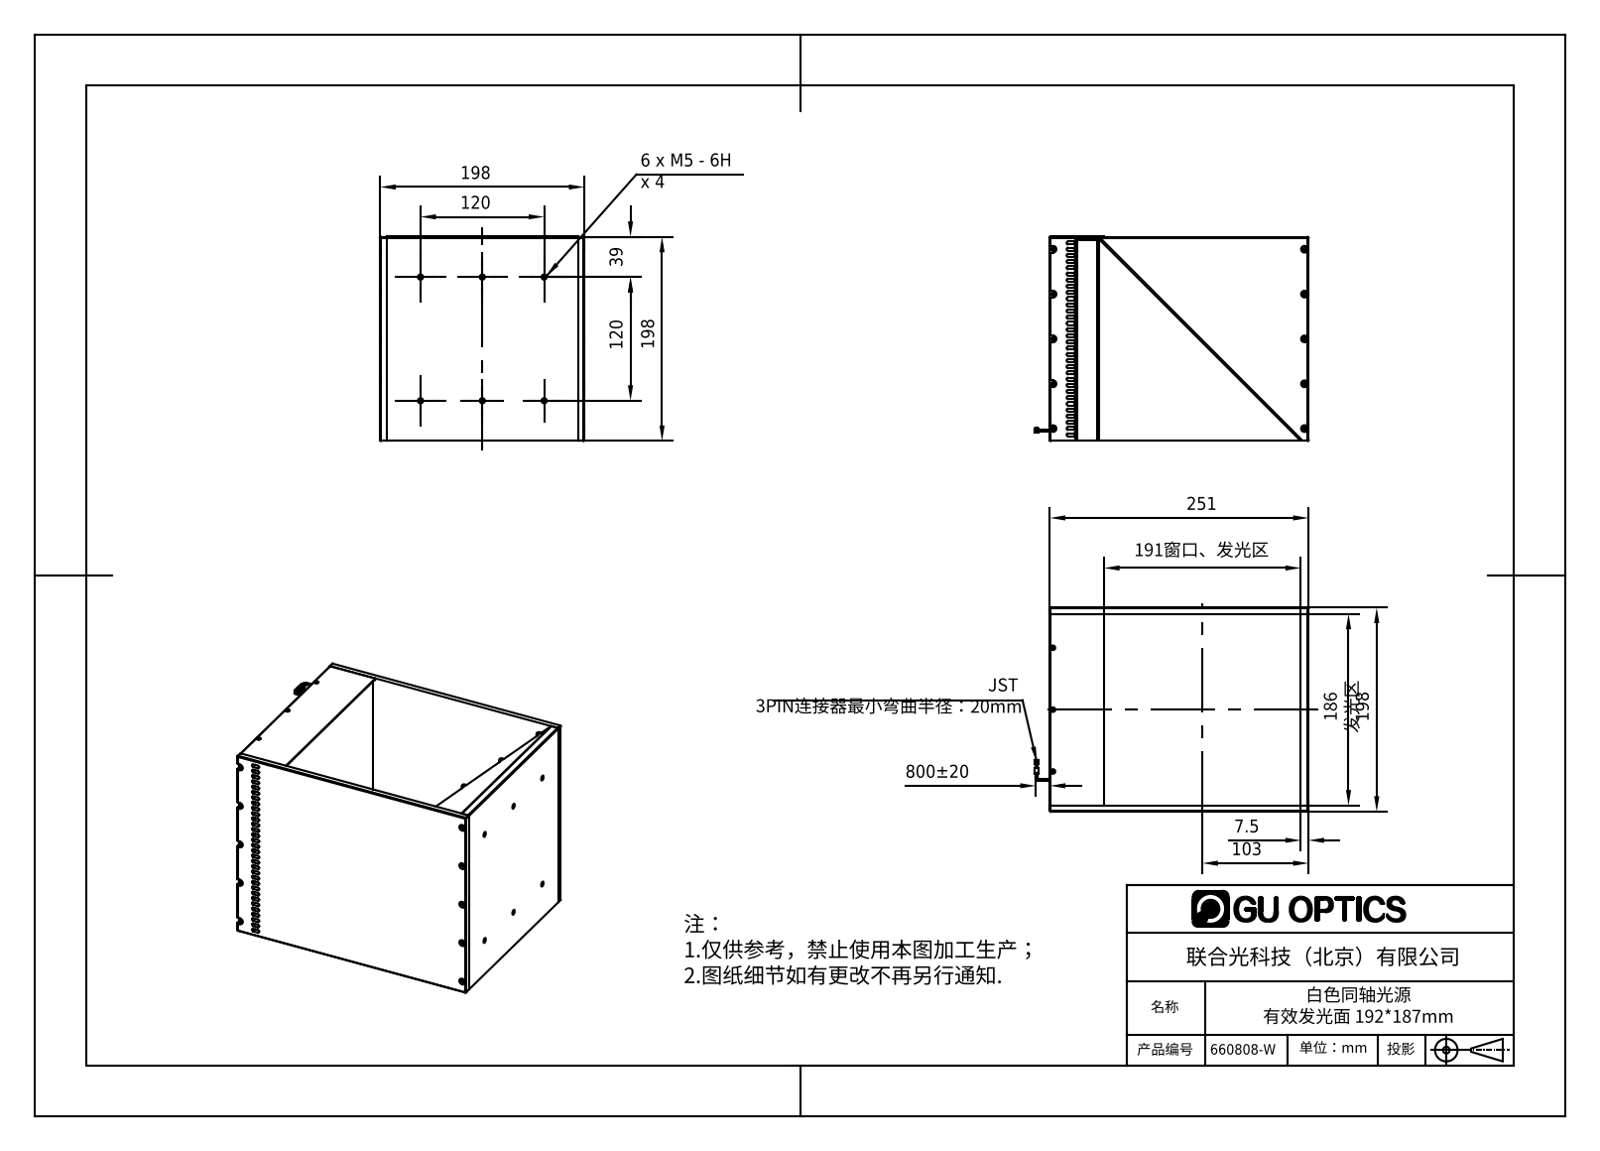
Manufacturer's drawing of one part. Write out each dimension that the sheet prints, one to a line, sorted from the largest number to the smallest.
800±20
251
198
198
198
191窗口、发光区
186 发光区
120
120
103
39
7.5
